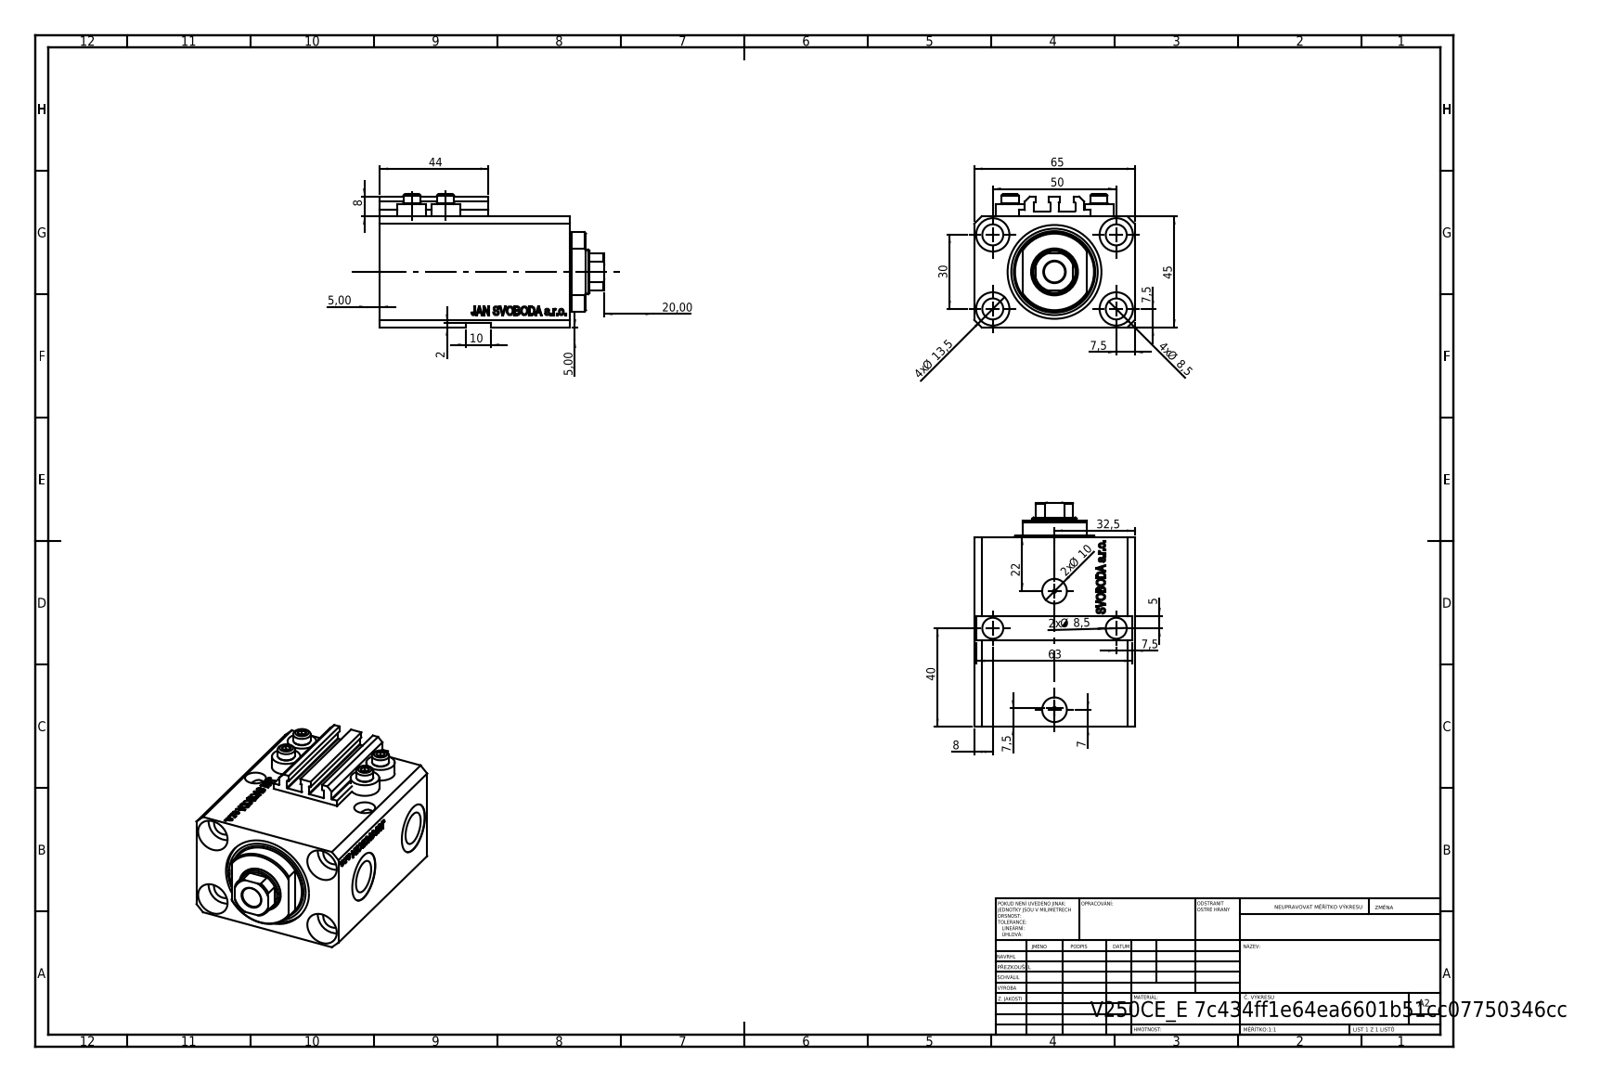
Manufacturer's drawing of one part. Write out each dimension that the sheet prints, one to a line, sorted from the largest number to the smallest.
65
63
50
45
44
40
32,5
30
22
20,00
4x Ø 13,5
10
2x Ø 10
4x Ø 8,5
2x Ø 8,5
8
8
7,5
7,5
7,5
7,5
7
5,00
5,00
5
2
